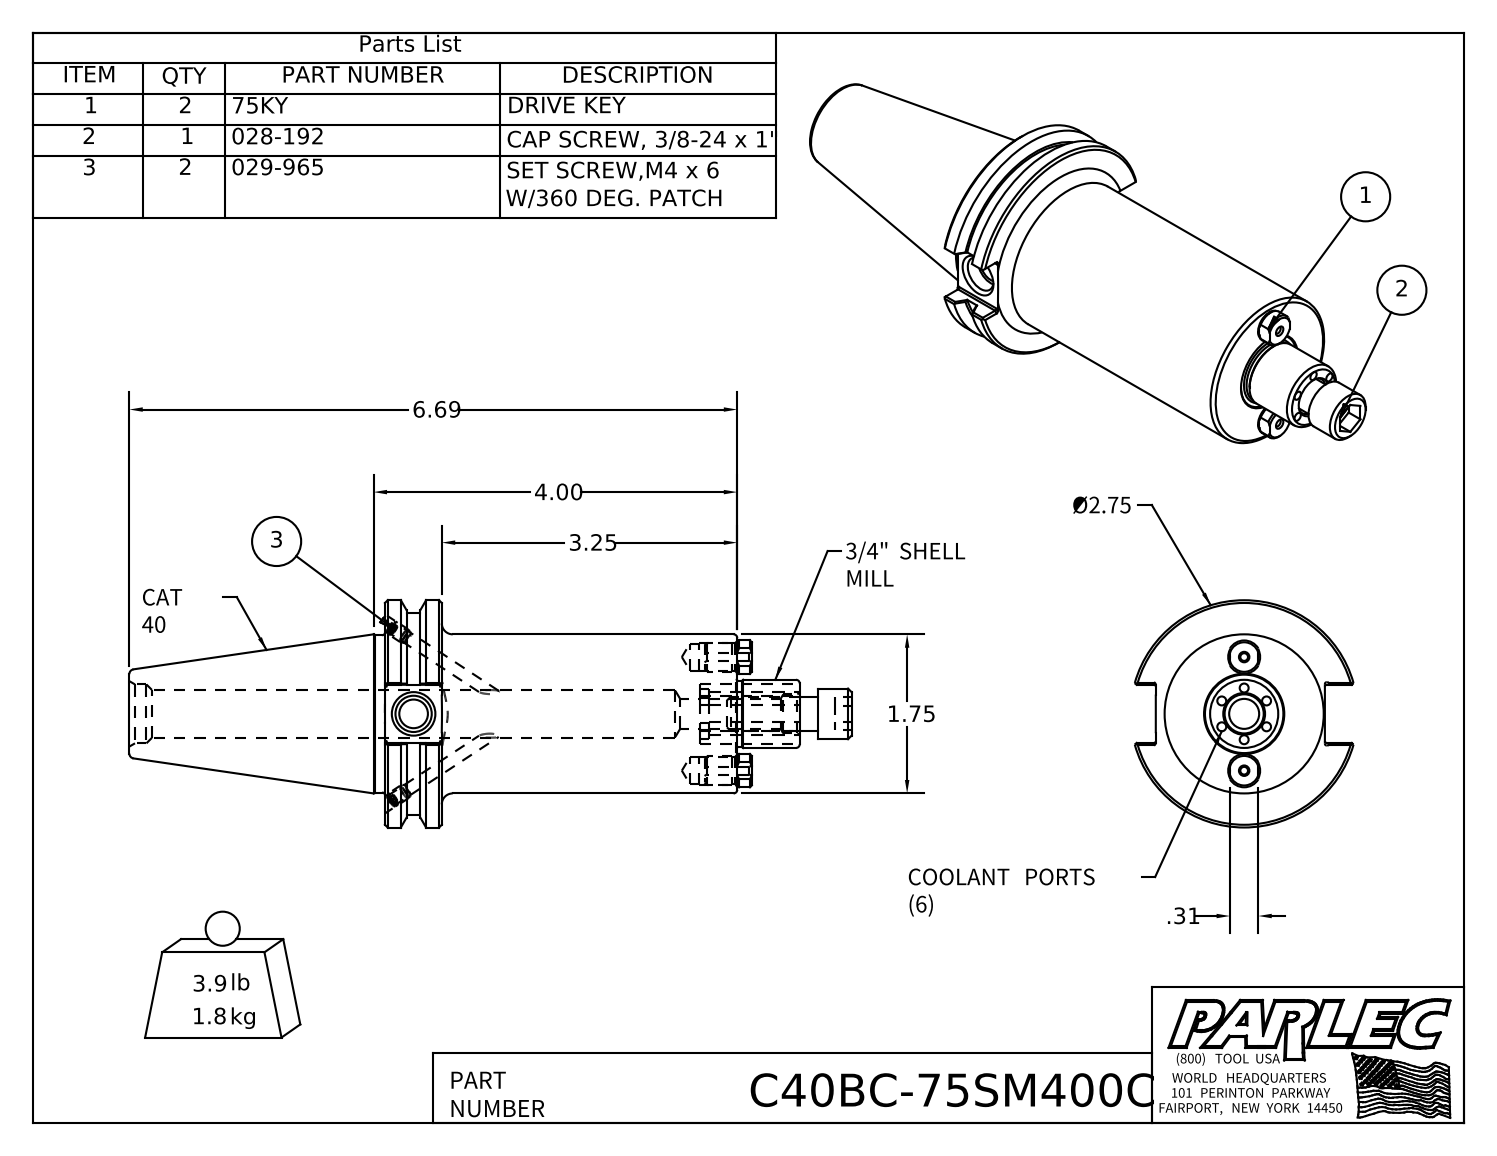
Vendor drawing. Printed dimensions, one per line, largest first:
6.69
4.00
3.25
1.75
.31
